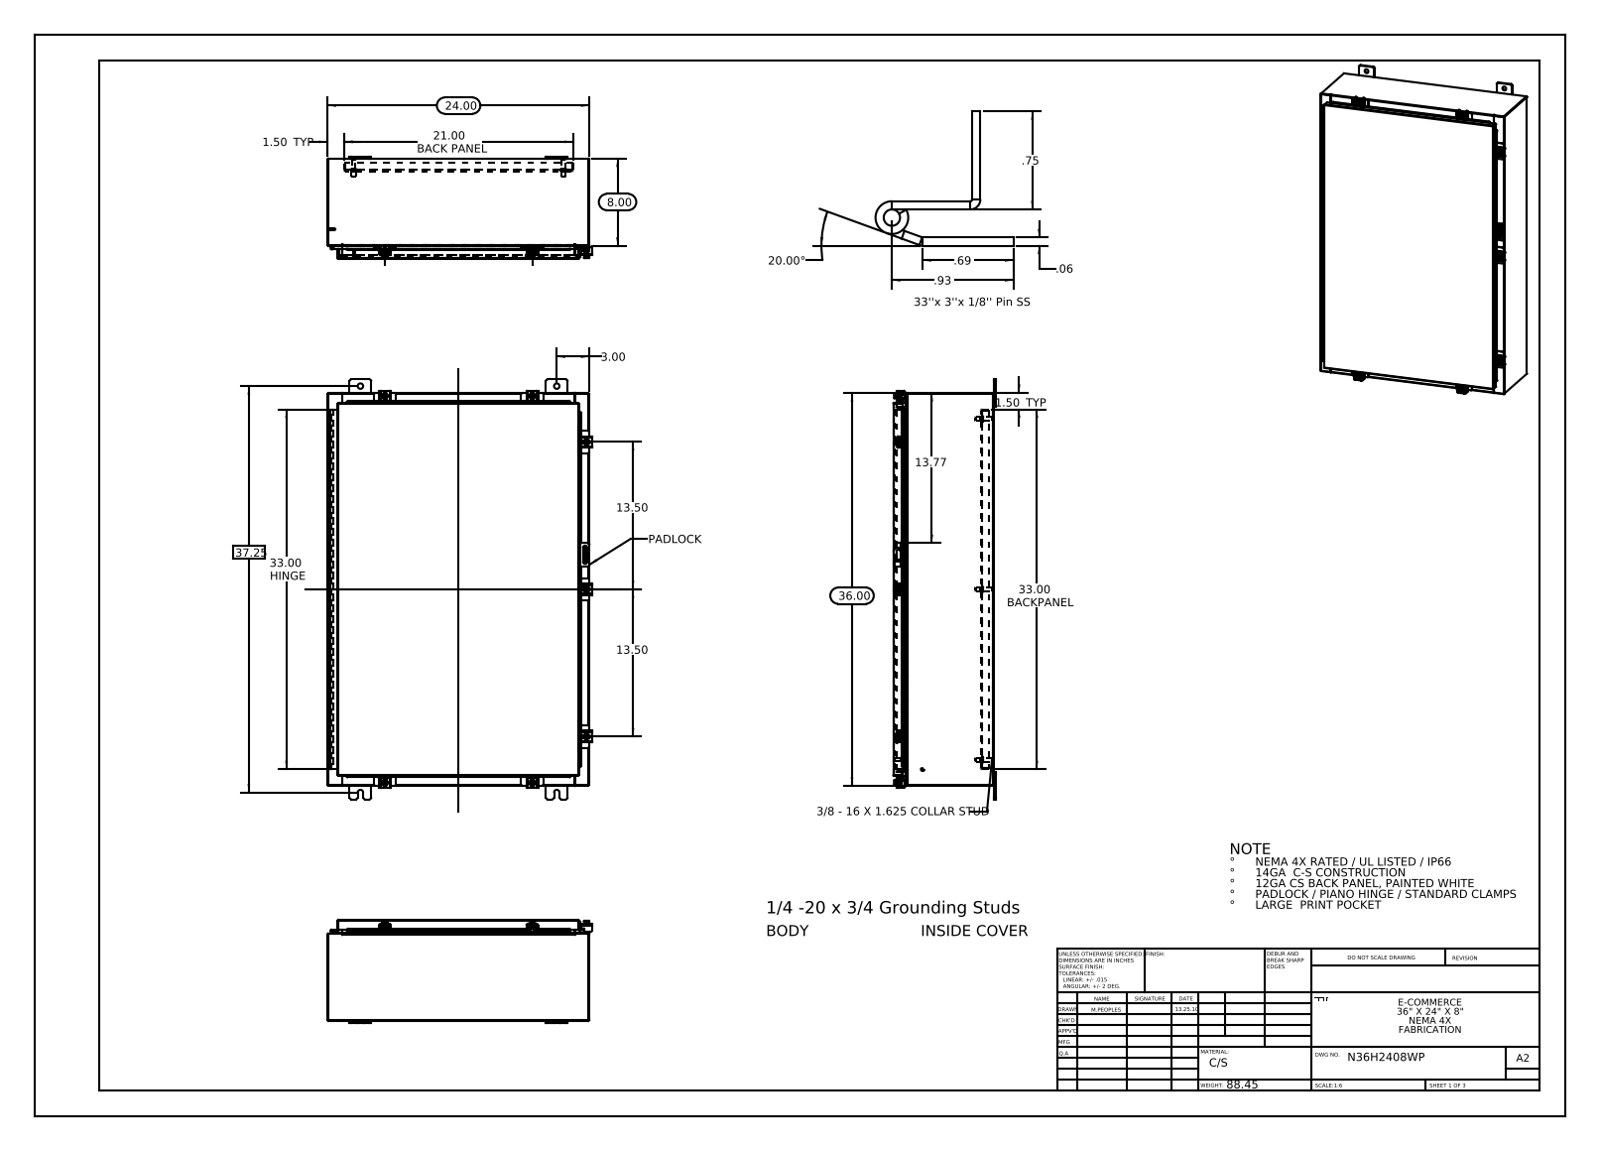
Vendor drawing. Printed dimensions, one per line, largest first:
37.25
36.00
33.00 HINGE
33.00 BACKPANEL
24.00
21.00 BACK PANEL
20.00°
13.77
13.50
13.50
8.00
3.00
1.50 TYP
1.50 TYP
.93
.75
.69
.06
